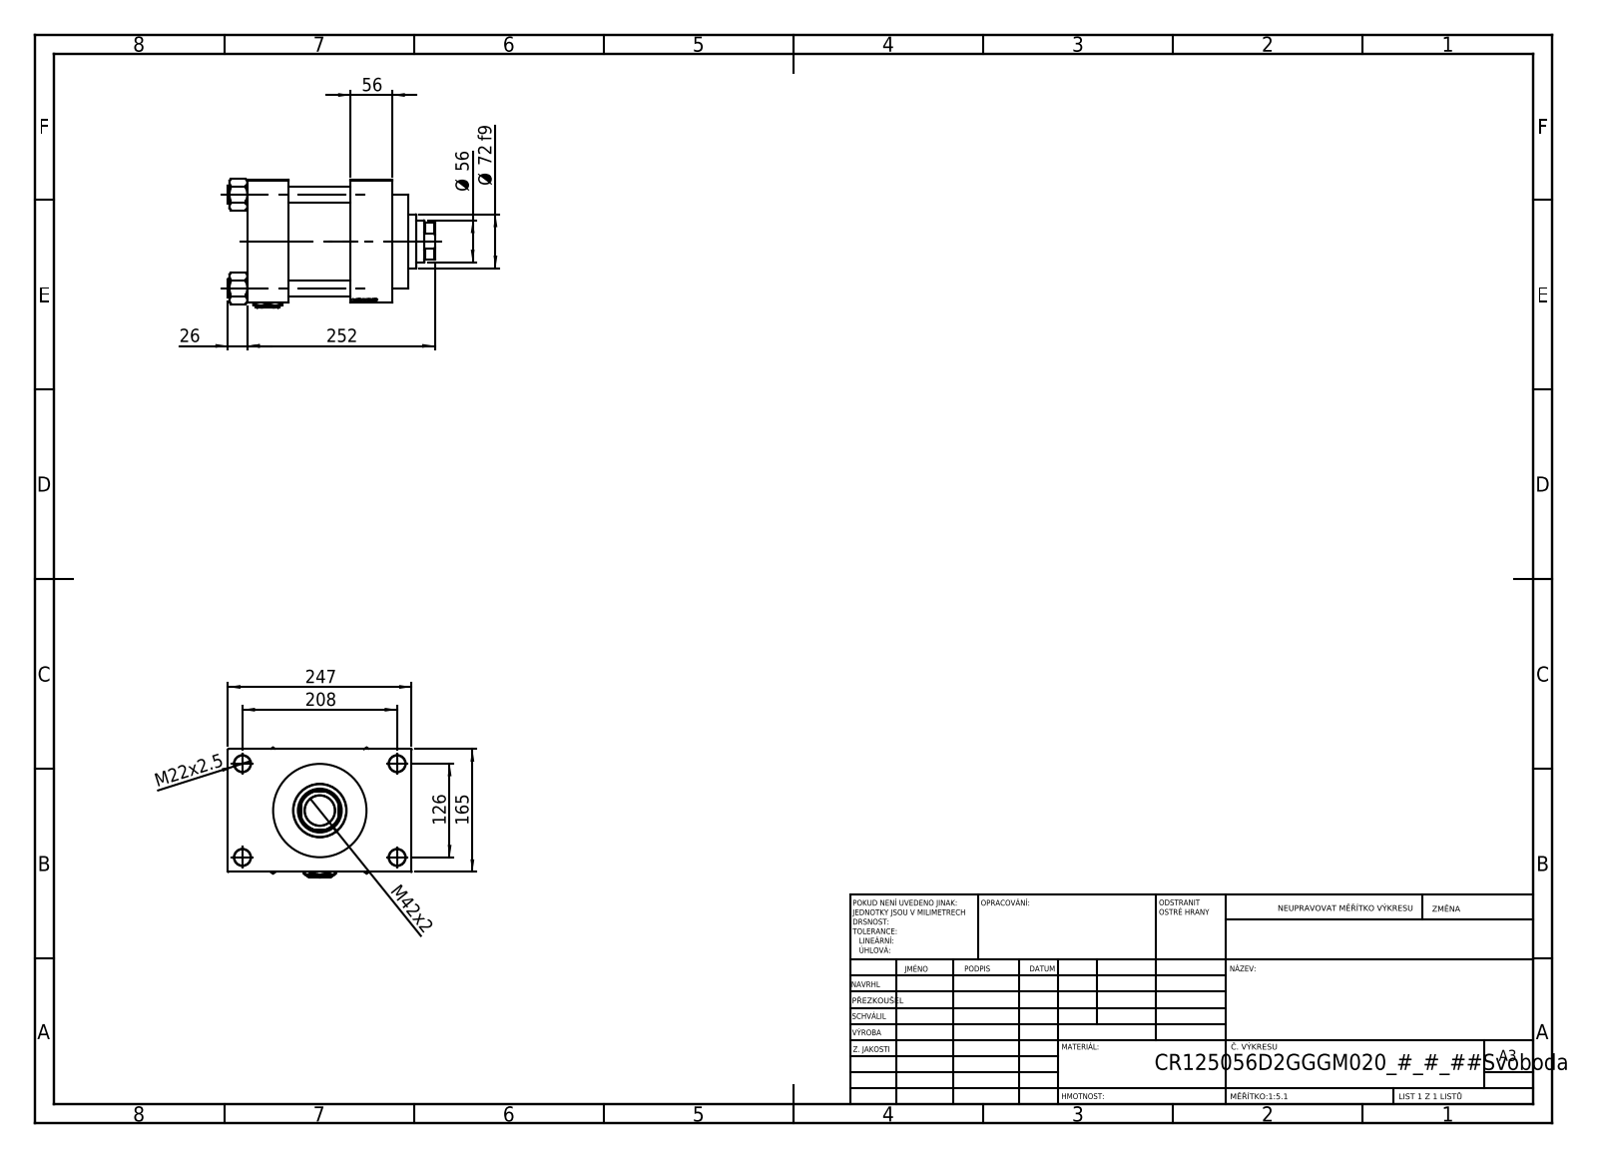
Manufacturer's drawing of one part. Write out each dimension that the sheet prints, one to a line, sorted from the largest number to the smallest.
252
247
208
165
126
Ø 72 f9
56
Ø 56
M42x2
26
M22x2.5
